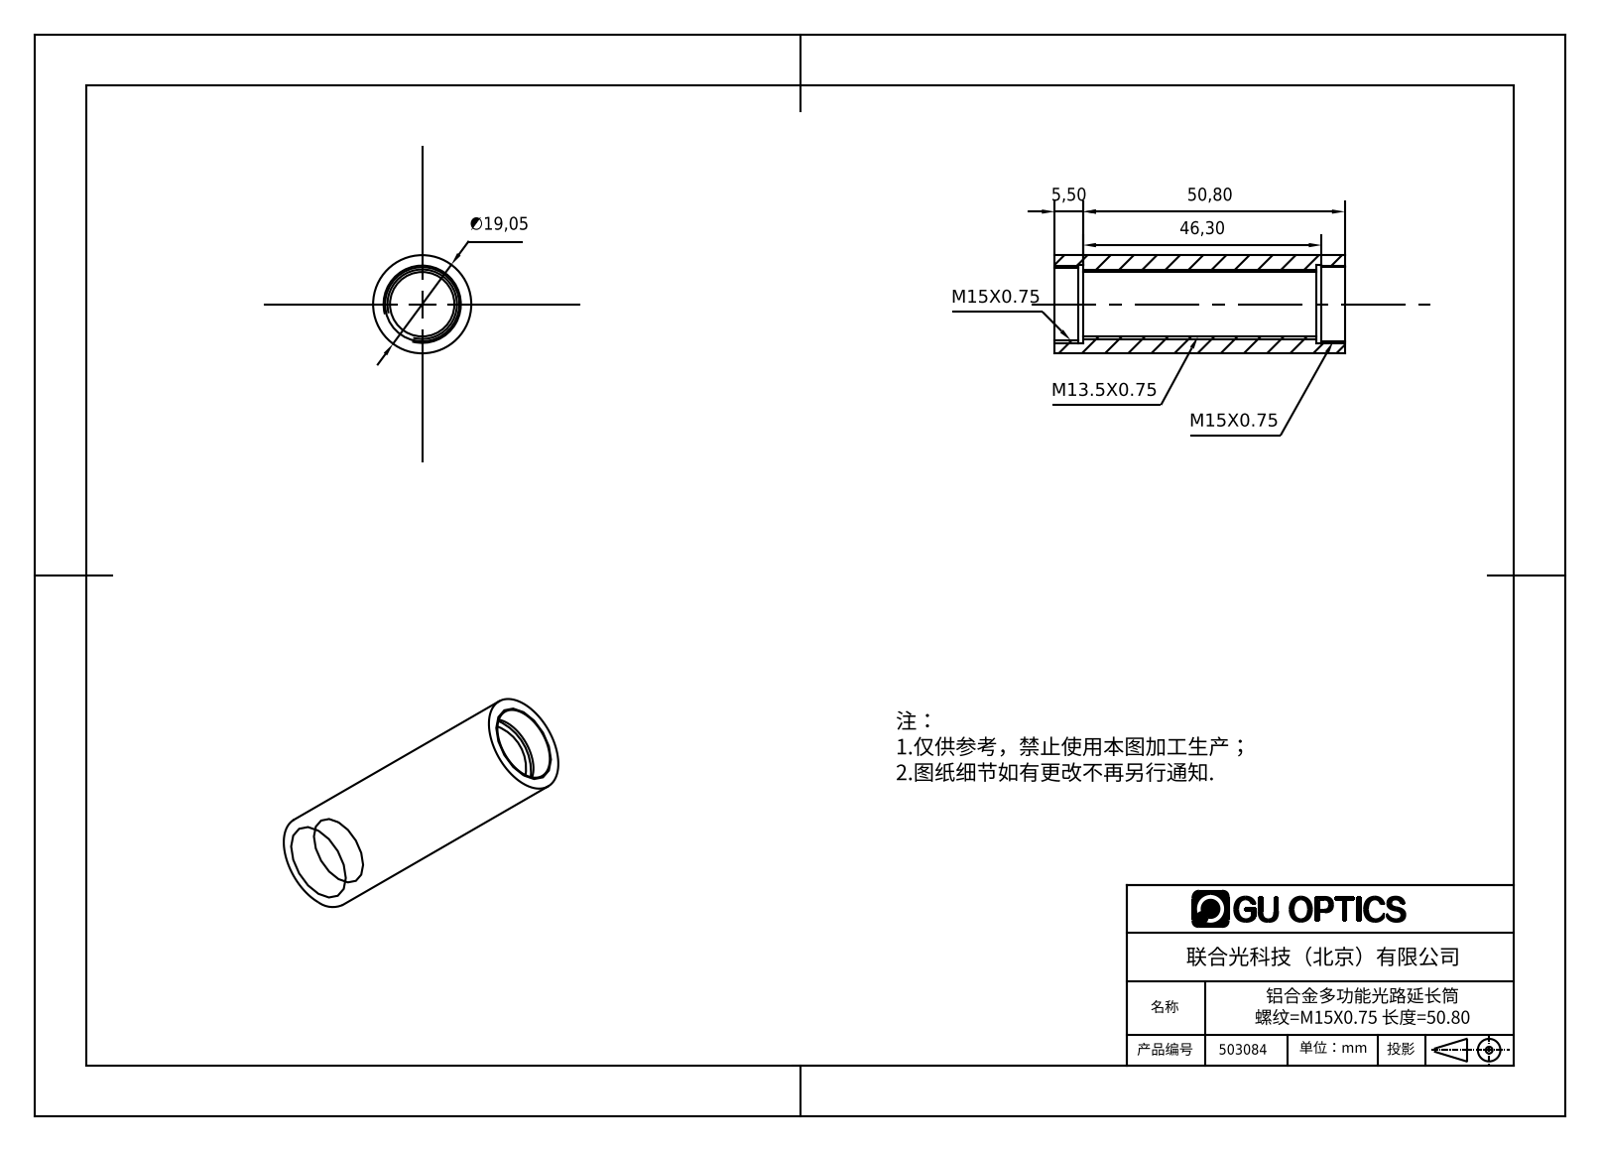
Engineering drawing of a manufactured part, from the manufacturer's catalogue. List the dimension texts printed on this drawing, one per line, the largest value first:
50,80
46,30
∅19,05
5,50
